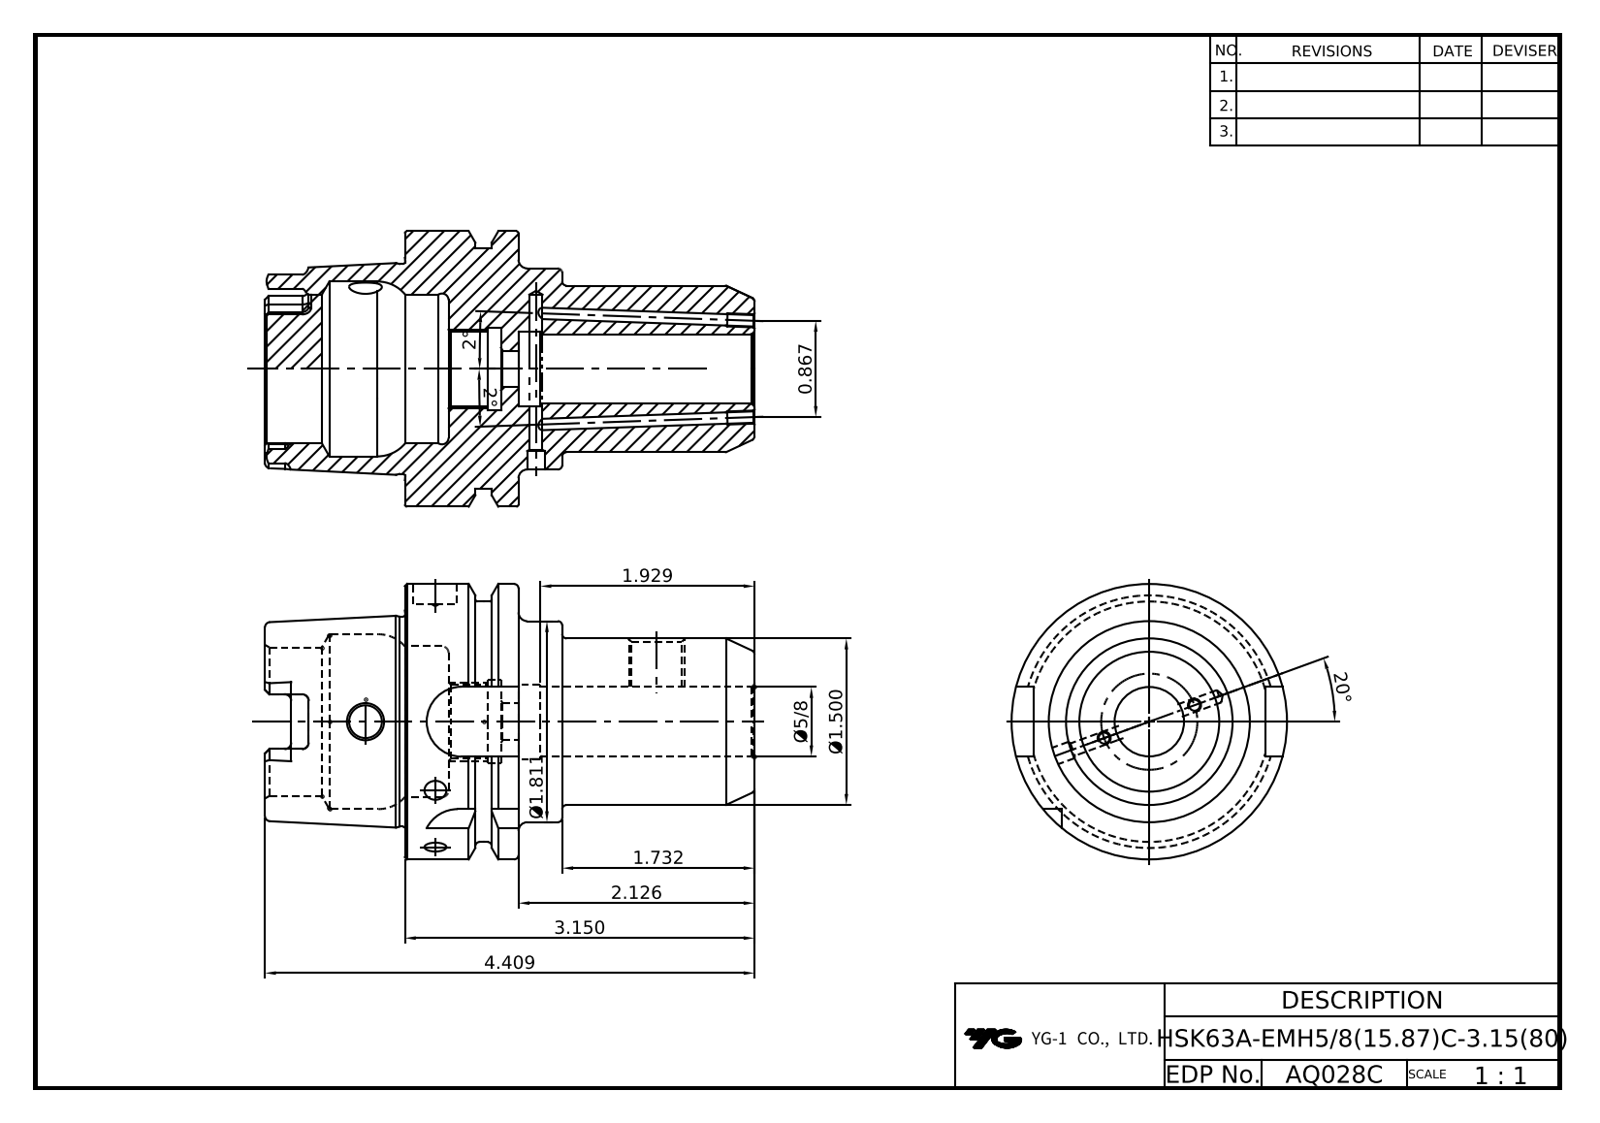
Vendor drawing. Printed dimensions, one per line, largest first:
20°
4.409
3.150
2.126
2°
2°
1.929
Ø1.811
1.732
Ø1.500
0.867
Ø5/8
